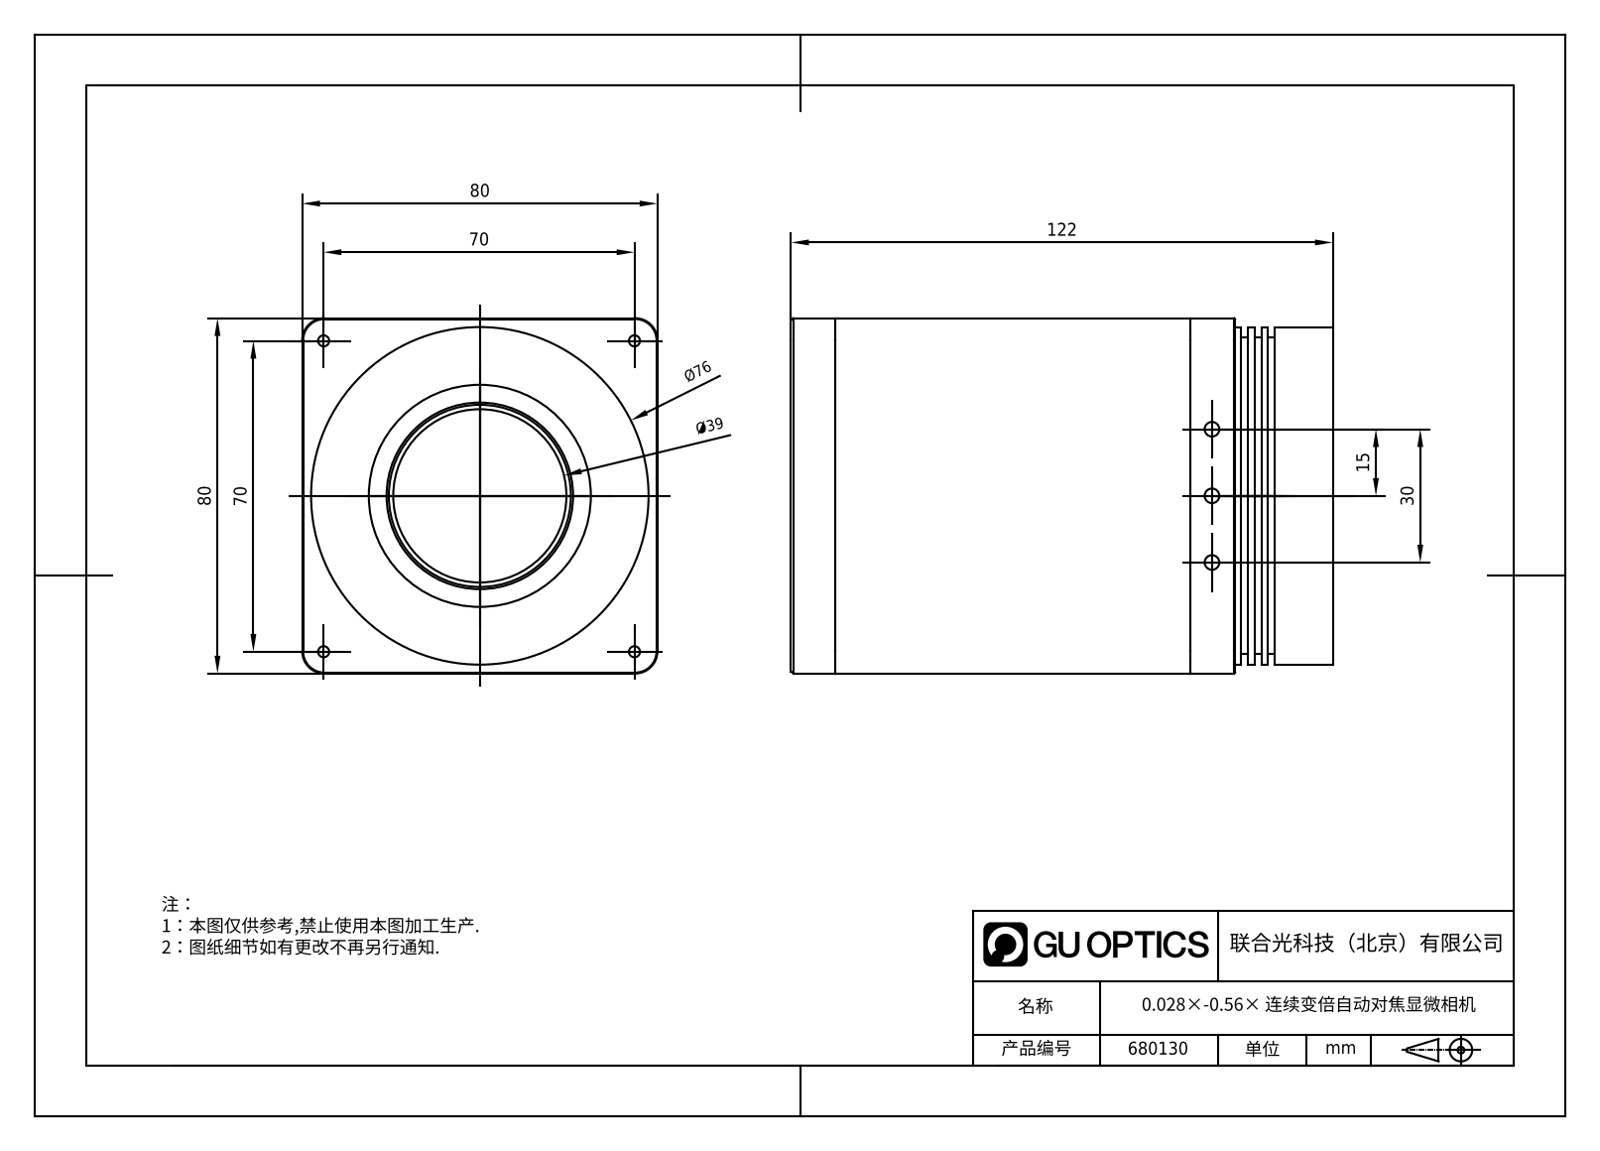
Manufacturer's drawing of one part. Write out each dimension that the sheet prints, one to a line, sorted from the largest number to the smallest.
122
80
80
Ø76
70
70
Ø39
30
15
